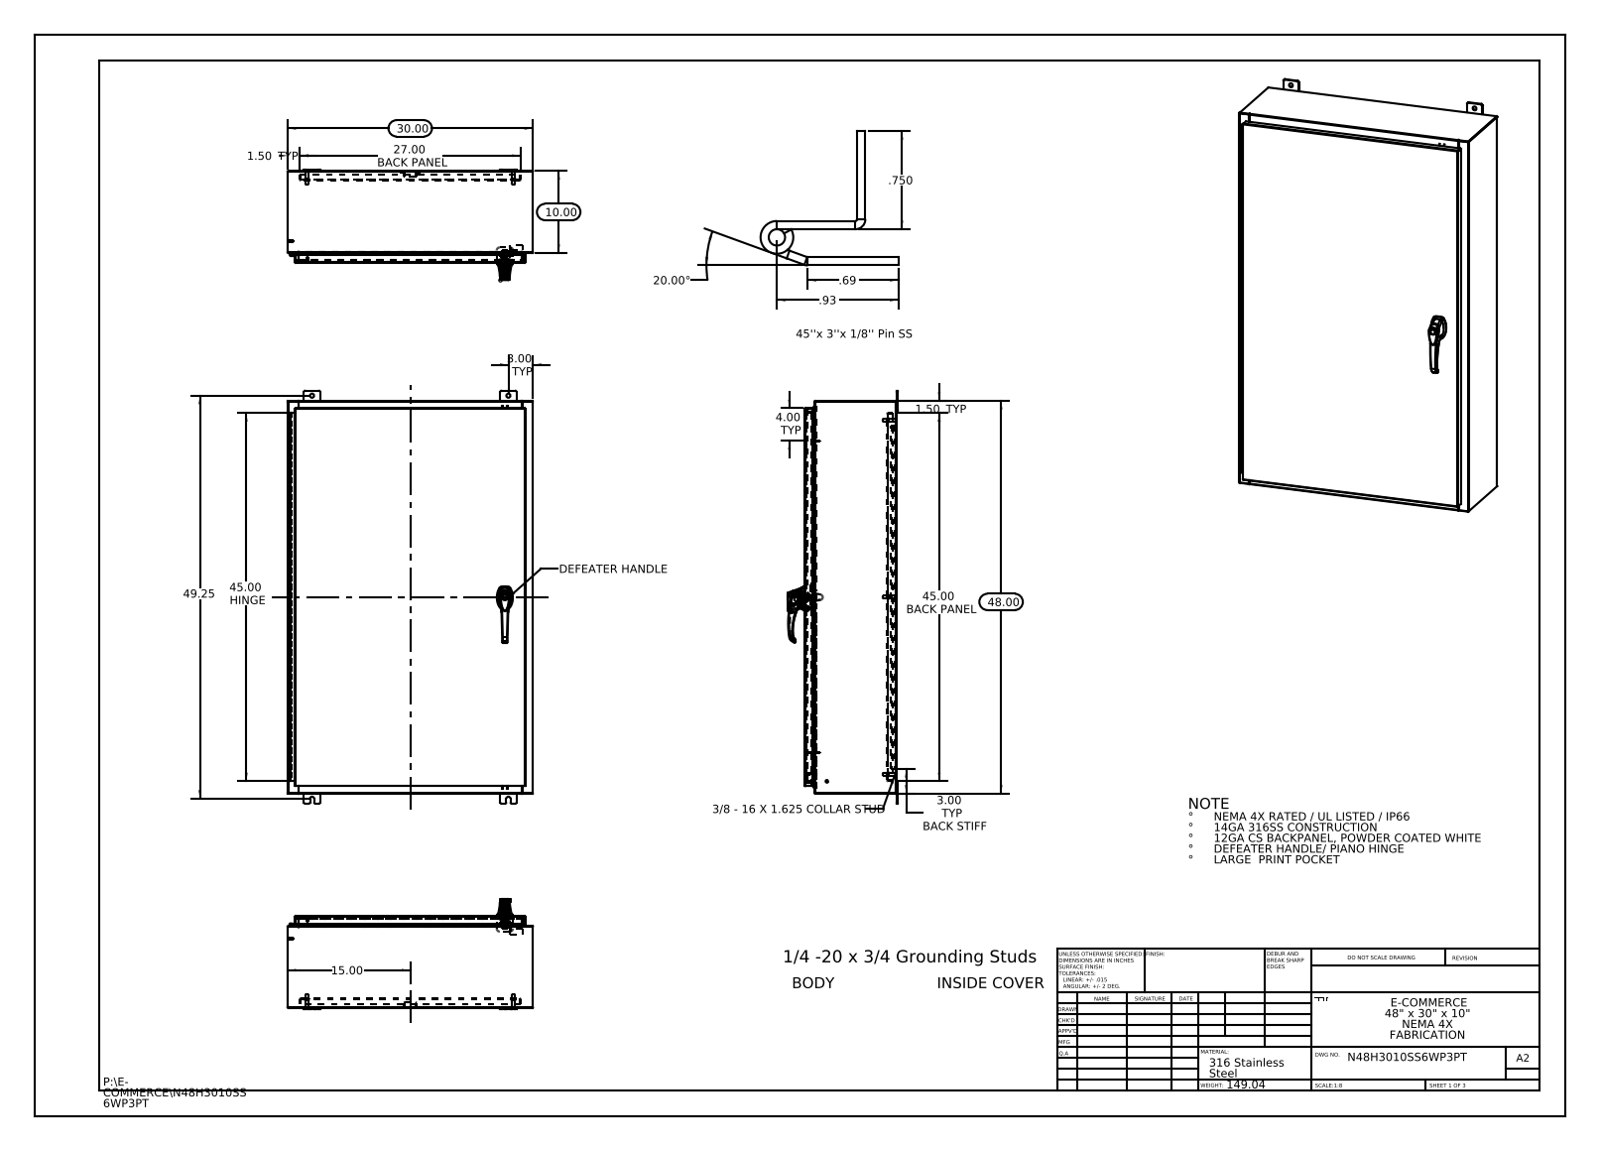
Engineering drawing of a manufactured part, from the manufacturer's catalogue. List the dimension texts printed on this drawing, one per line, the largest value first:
49.25
48.00
45.00 HINGE
45.00 BACK PANEL
30.00
27.00 BACK PANEL
20.00°
15.00
10.00
4.00 TYP
3.00 TYP
3.00 TYP BACK STIFF
1.50 TYP
1.50 TYP
.93
.750
.69
